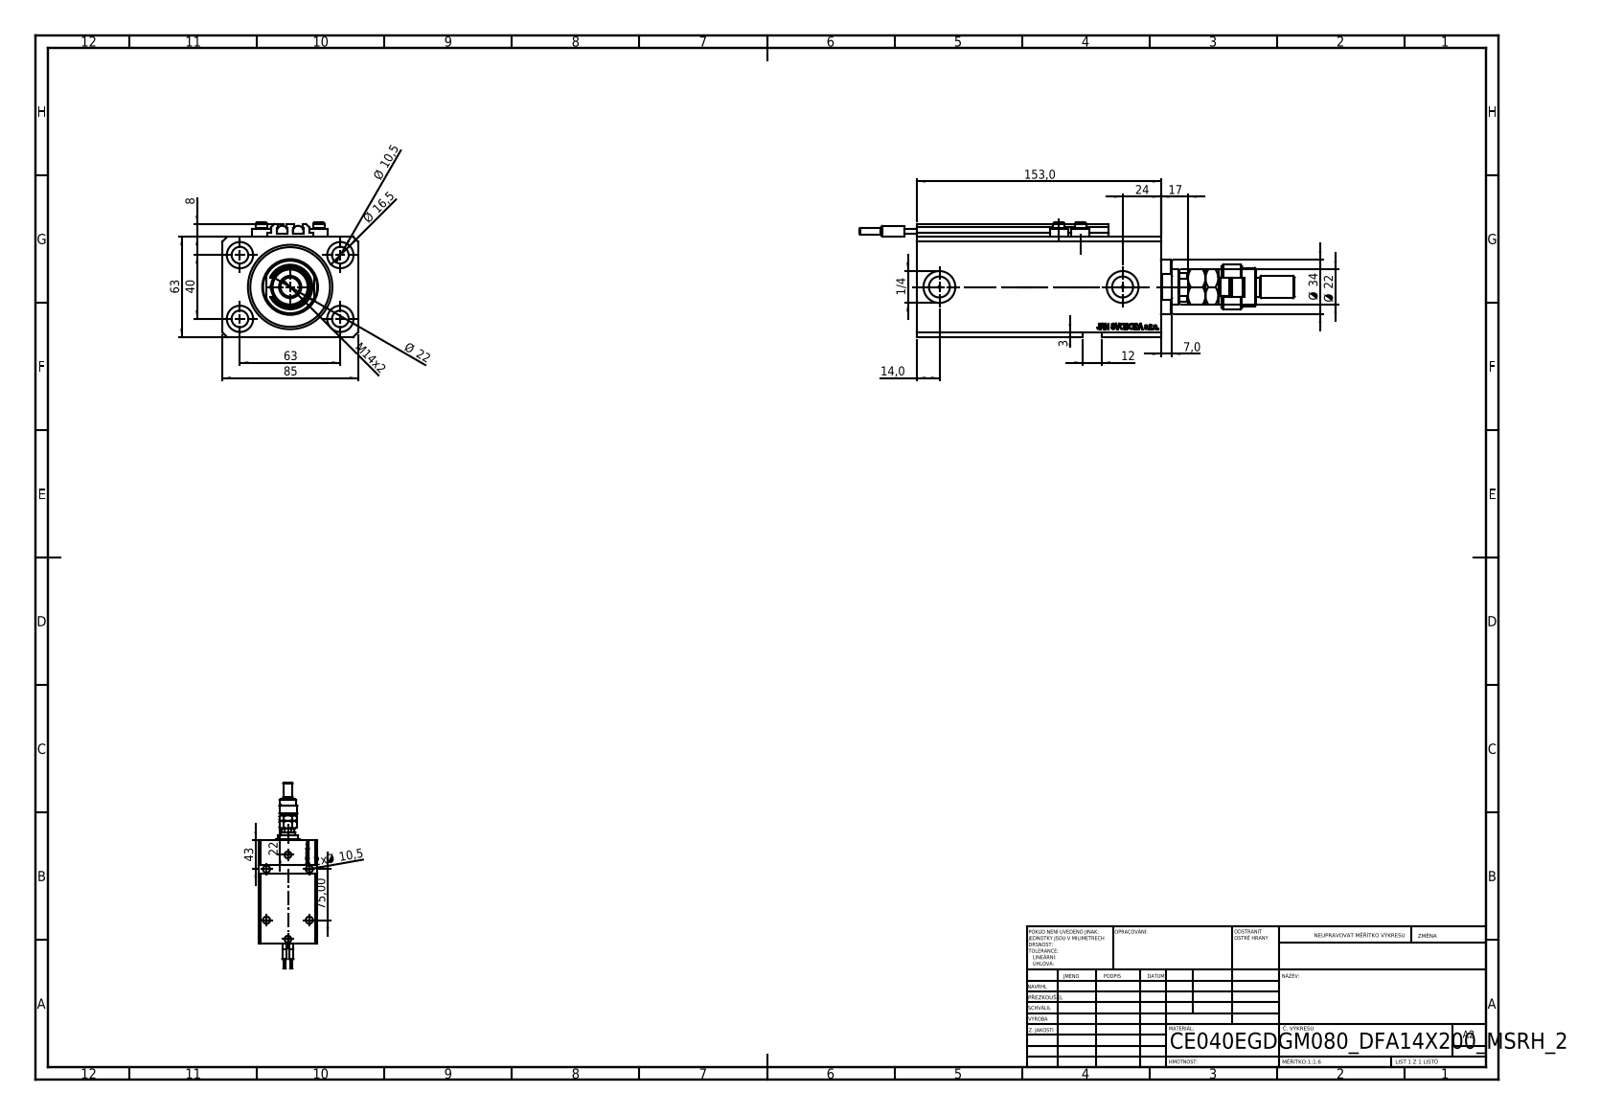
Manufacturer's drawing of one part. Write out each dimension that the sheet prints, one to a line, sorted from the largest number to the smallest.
153,0
85
75,00
63
63
43
40
Ø 34
24
Ø 22
Ø 22
22
17
Ø 16,5
M14x2
14,0
12
Ø 10,5
2x Ø 10,5
8
7,0
3
1/4
